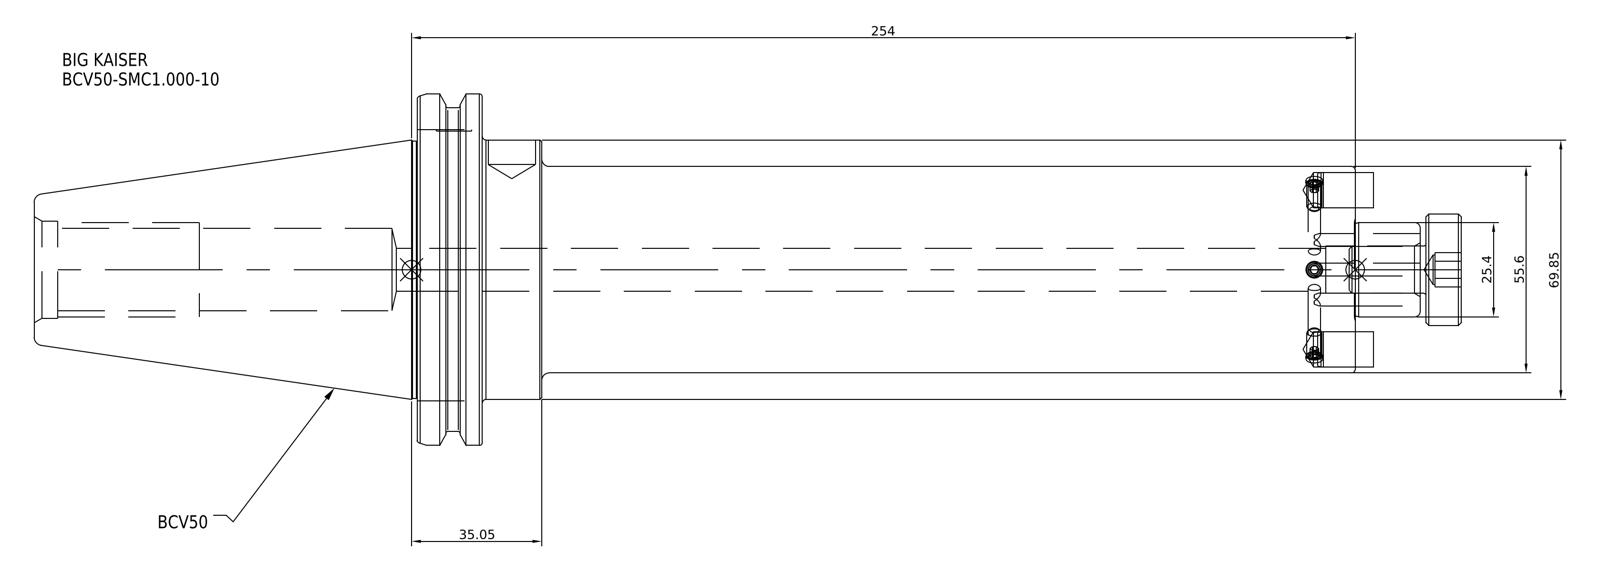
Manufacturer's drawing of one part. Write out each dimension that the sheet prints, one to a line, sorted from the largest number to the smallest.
254
69.85
55.6
35.05
25.4
